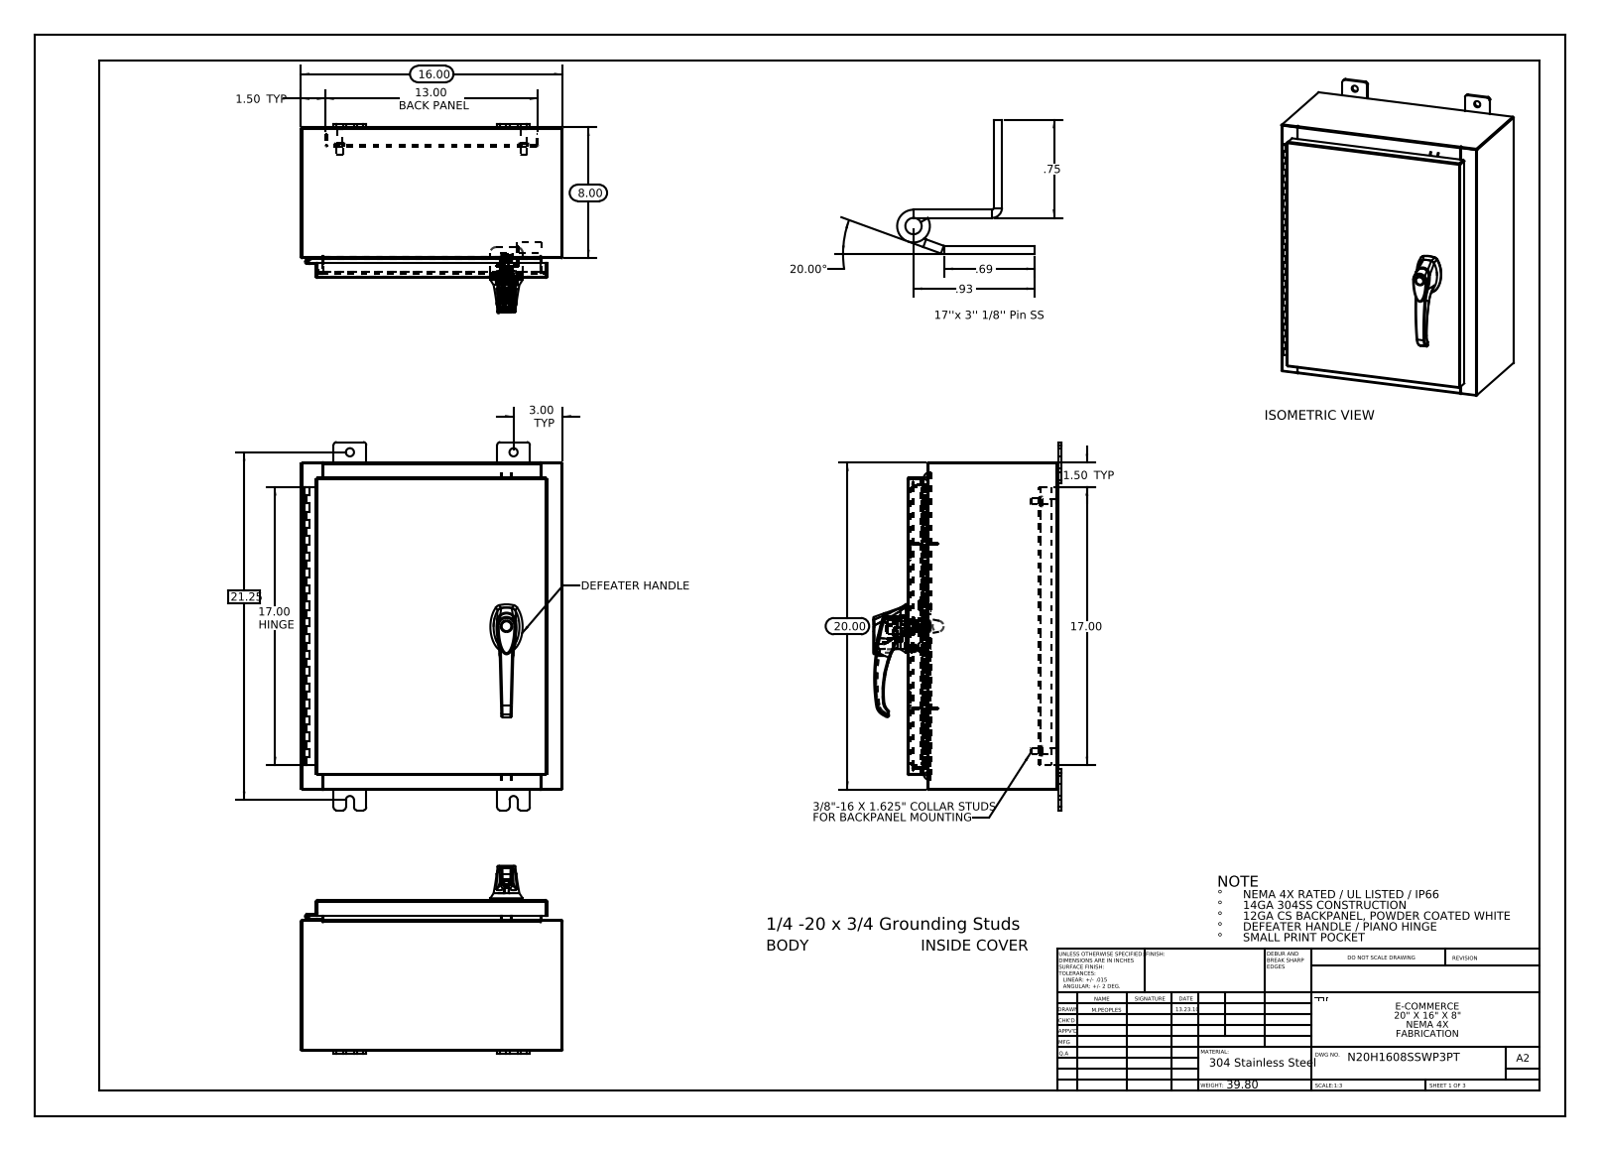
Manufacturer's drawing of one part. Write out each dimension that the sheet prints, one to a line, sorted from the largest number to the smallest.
21.25
20.00
20.00°
17.00 HINGE
17.00
16.00
13.00 BACK PANEL
8.00
3.00 TYP
1.50 TYP
1.50 TYP
.93
.75
.69
